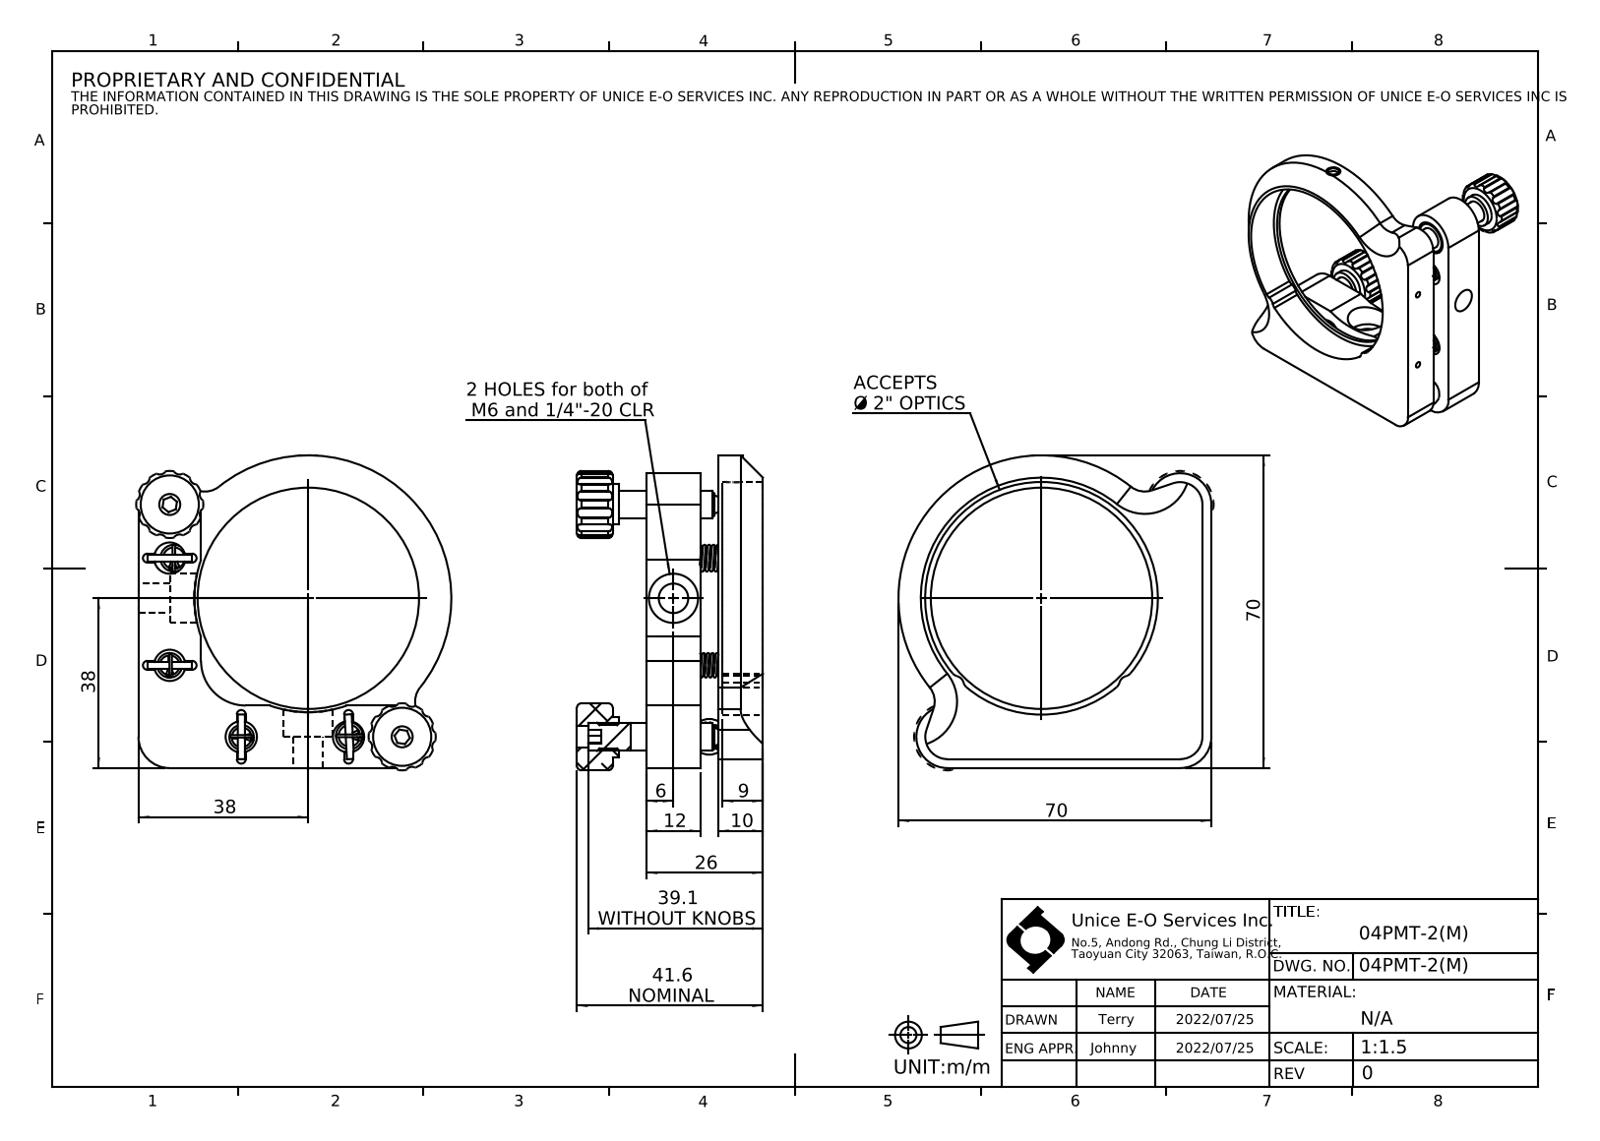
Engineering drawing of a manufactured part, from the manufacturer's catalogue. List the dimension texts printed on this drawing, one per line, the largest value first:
70
70
41.6 NOMINAL
39.1 WITHOUT KNOBS
38
38
26
12
10
9
6
2 HOLES for both of M6 and 1/4"-20 CLR
ACCEPTS Ø 2" OPTICS
